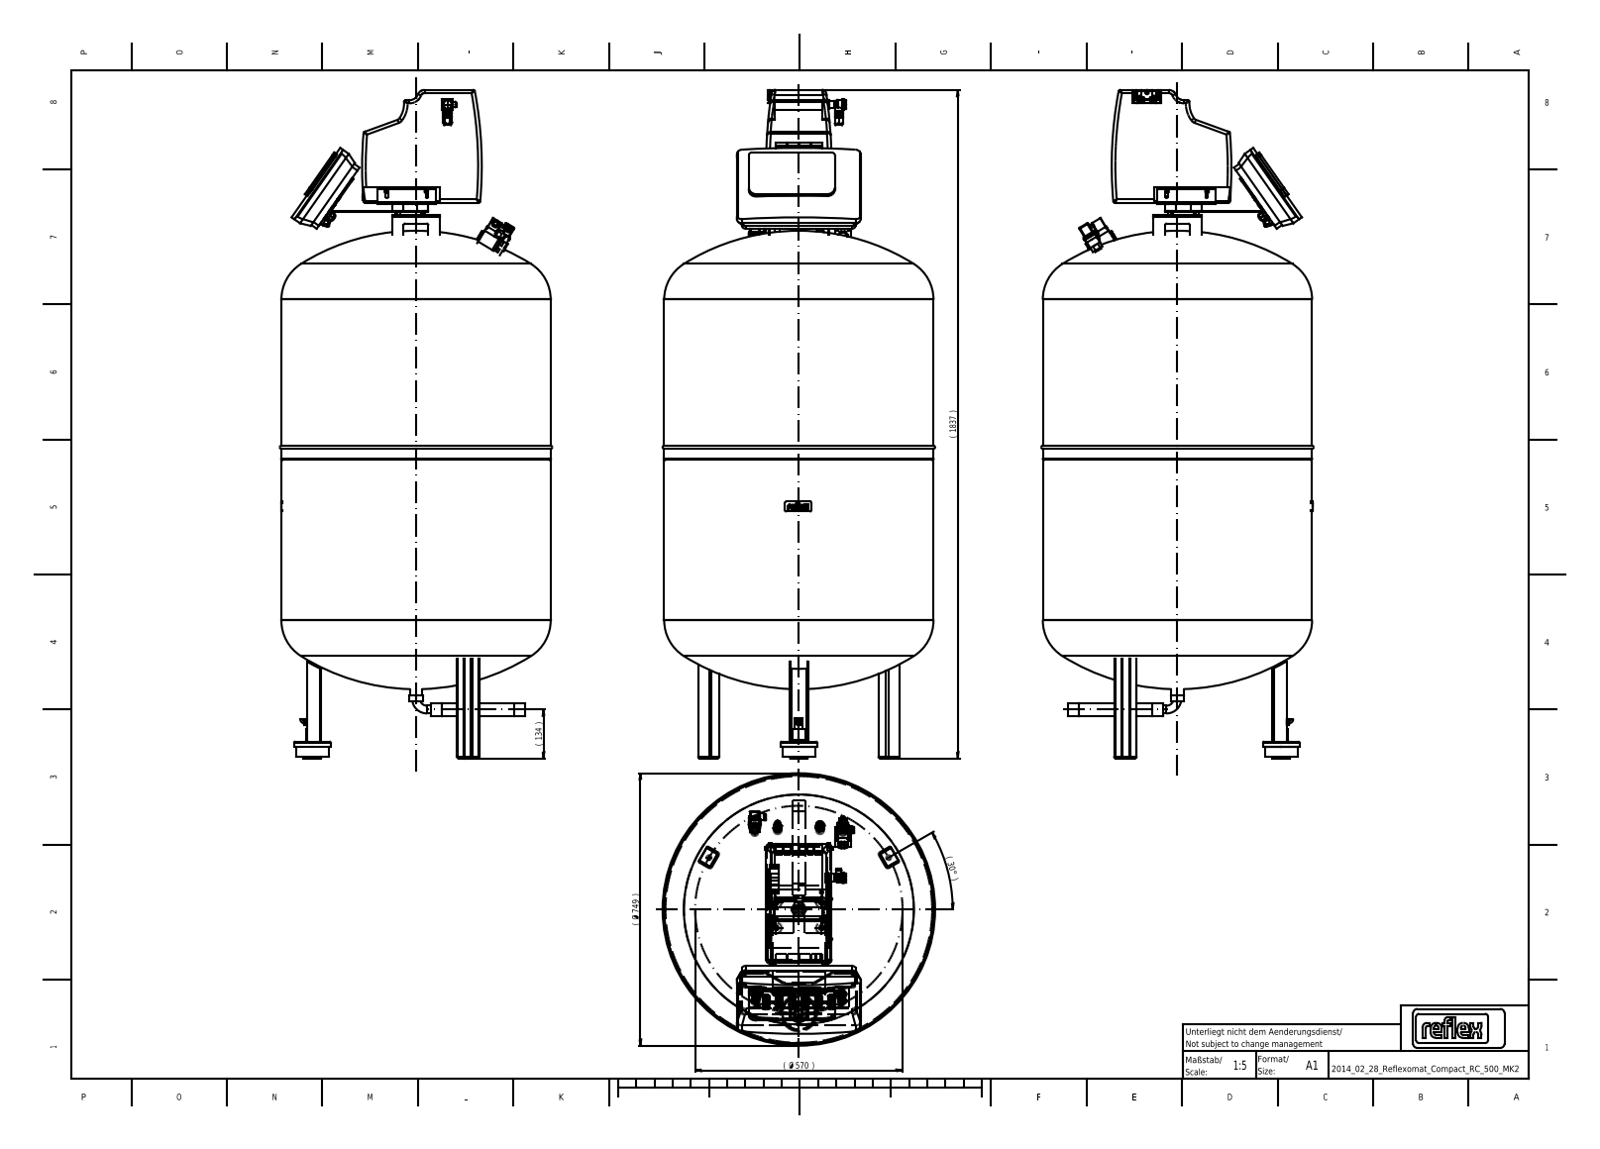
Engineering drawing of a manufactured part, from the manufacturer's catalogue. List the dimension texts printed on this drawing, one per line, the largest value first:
1837 ( )
749 Ø ( )
570 Ø ( )
134 ( )
30 ° ( )
